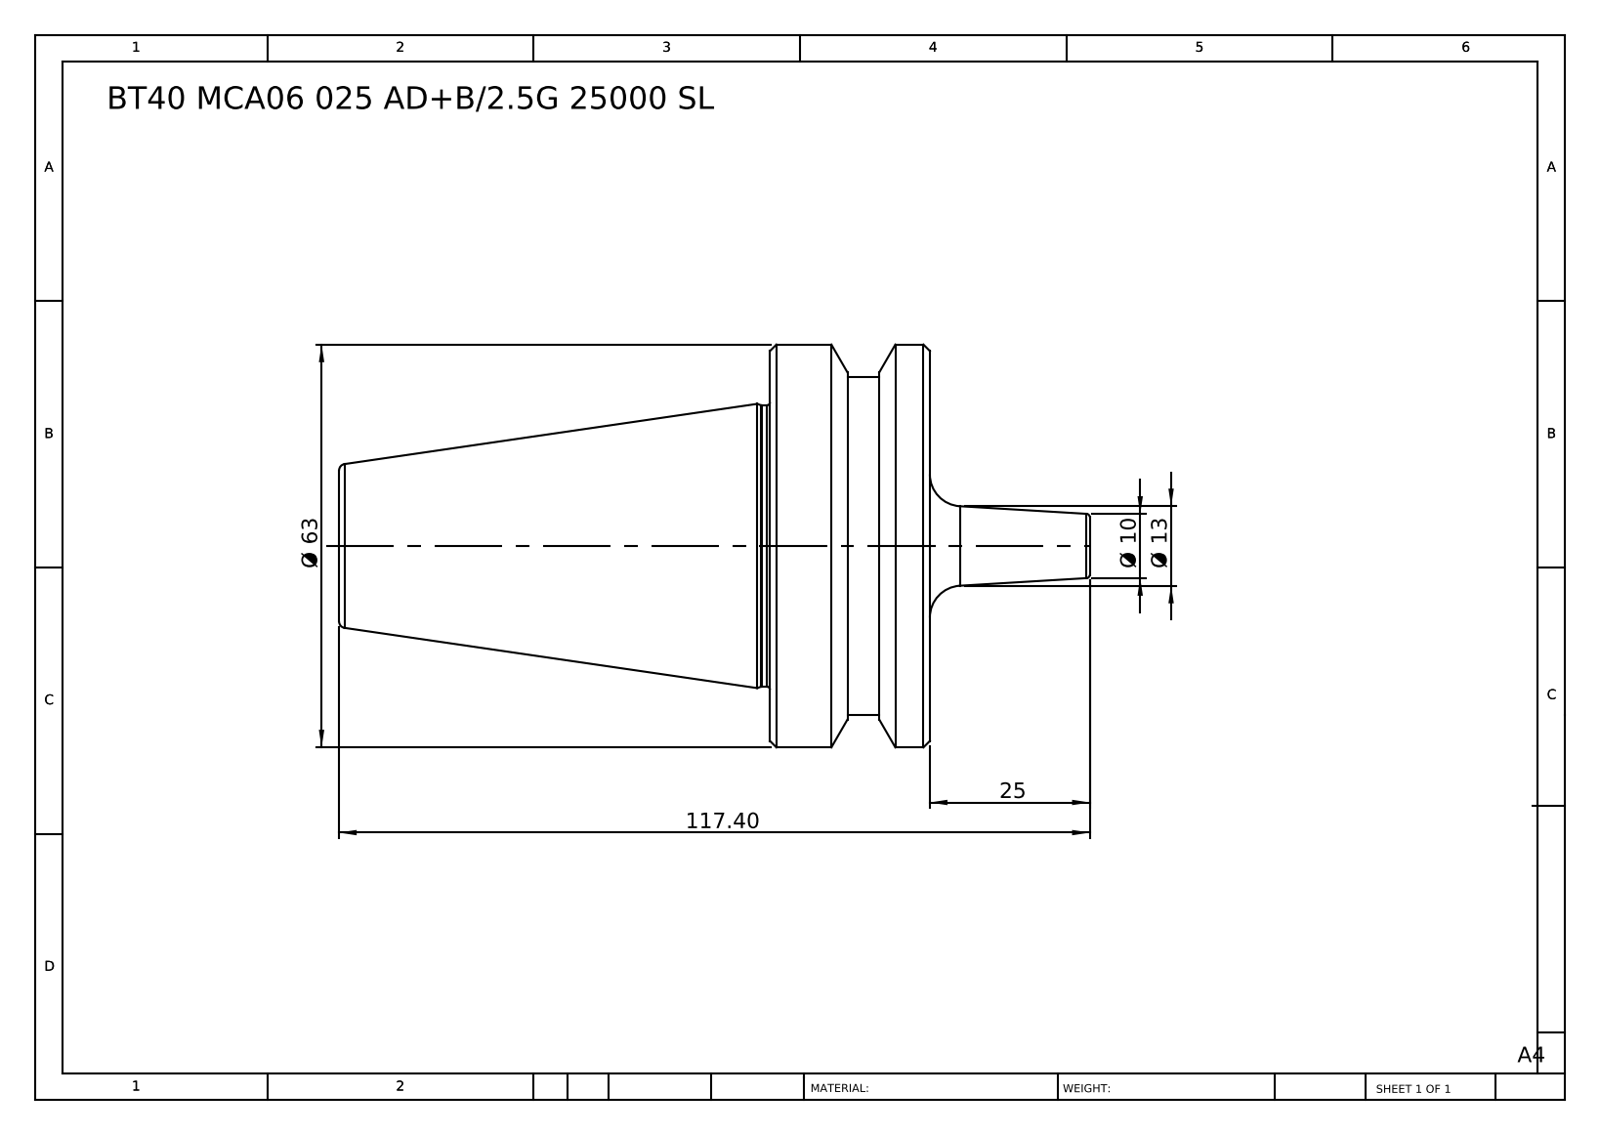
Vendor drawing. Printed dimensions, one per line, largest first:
117.40
Ø 63
25
Ø 13
Ø 10
